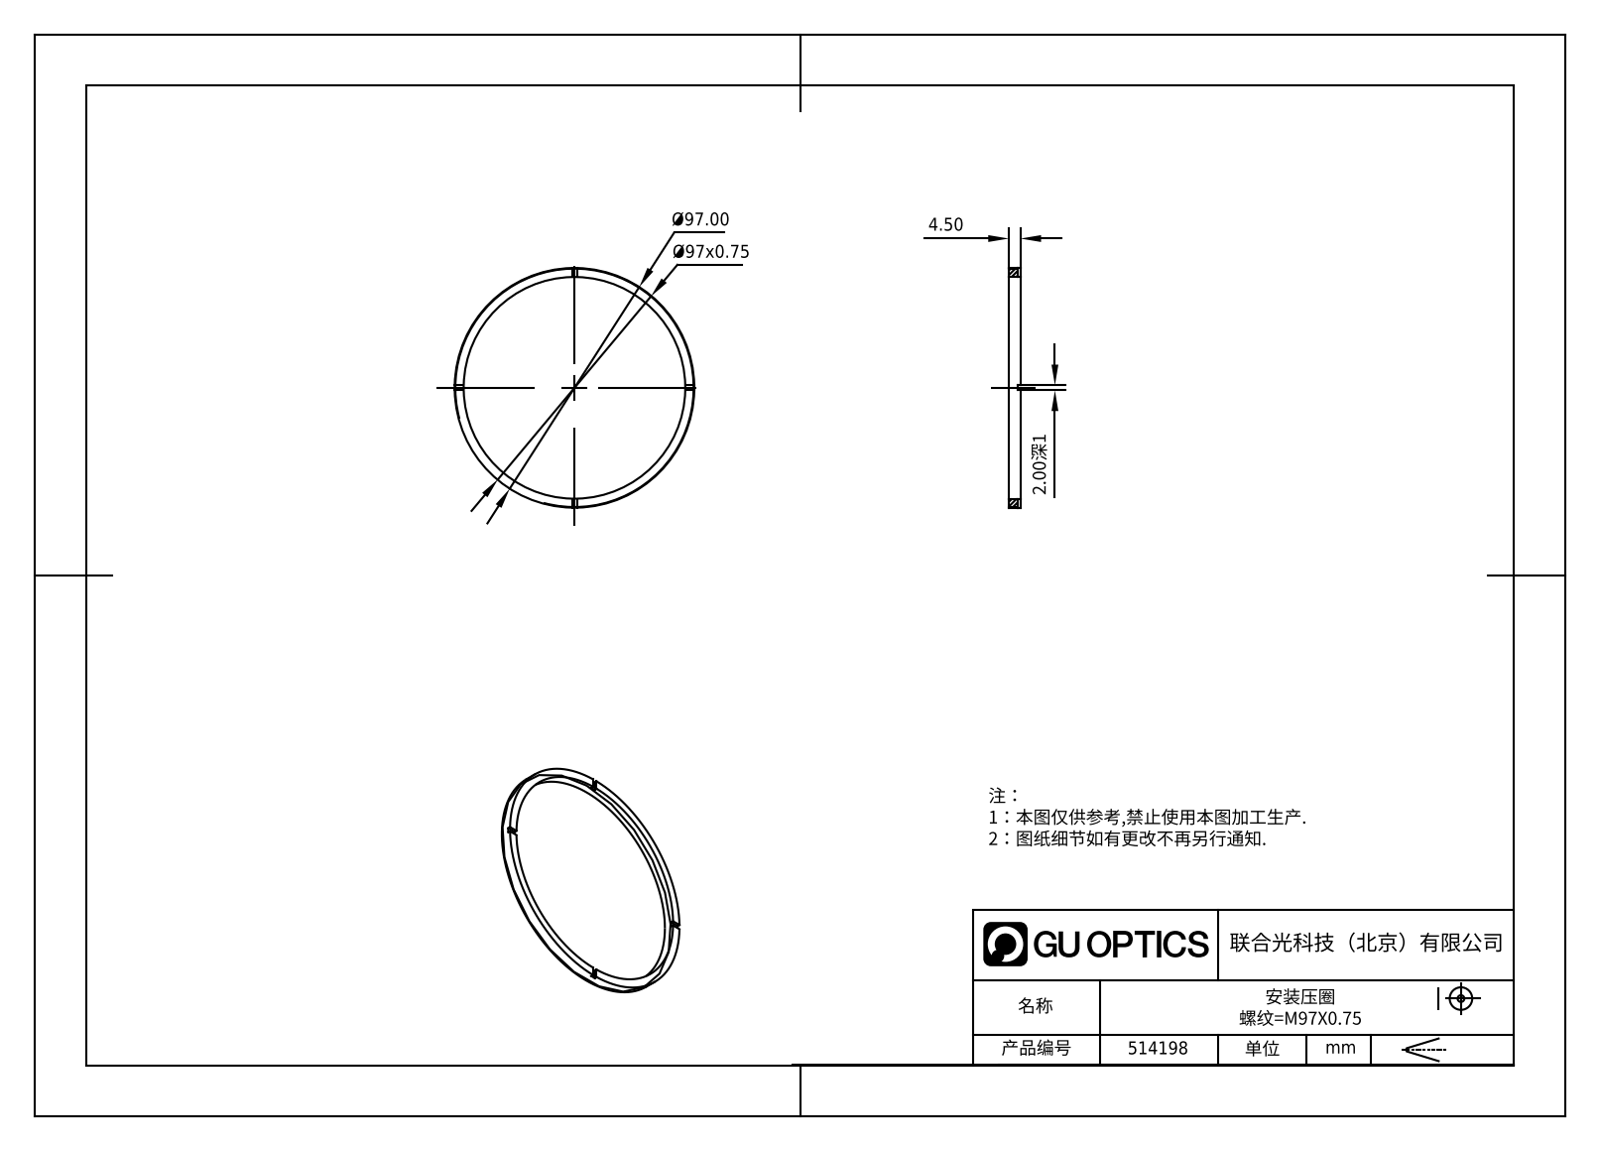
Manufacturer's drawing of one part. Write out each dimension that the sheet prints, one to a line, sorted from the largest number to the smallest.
Ø97.00
Ø97x0.75
4.50
2.00深1
